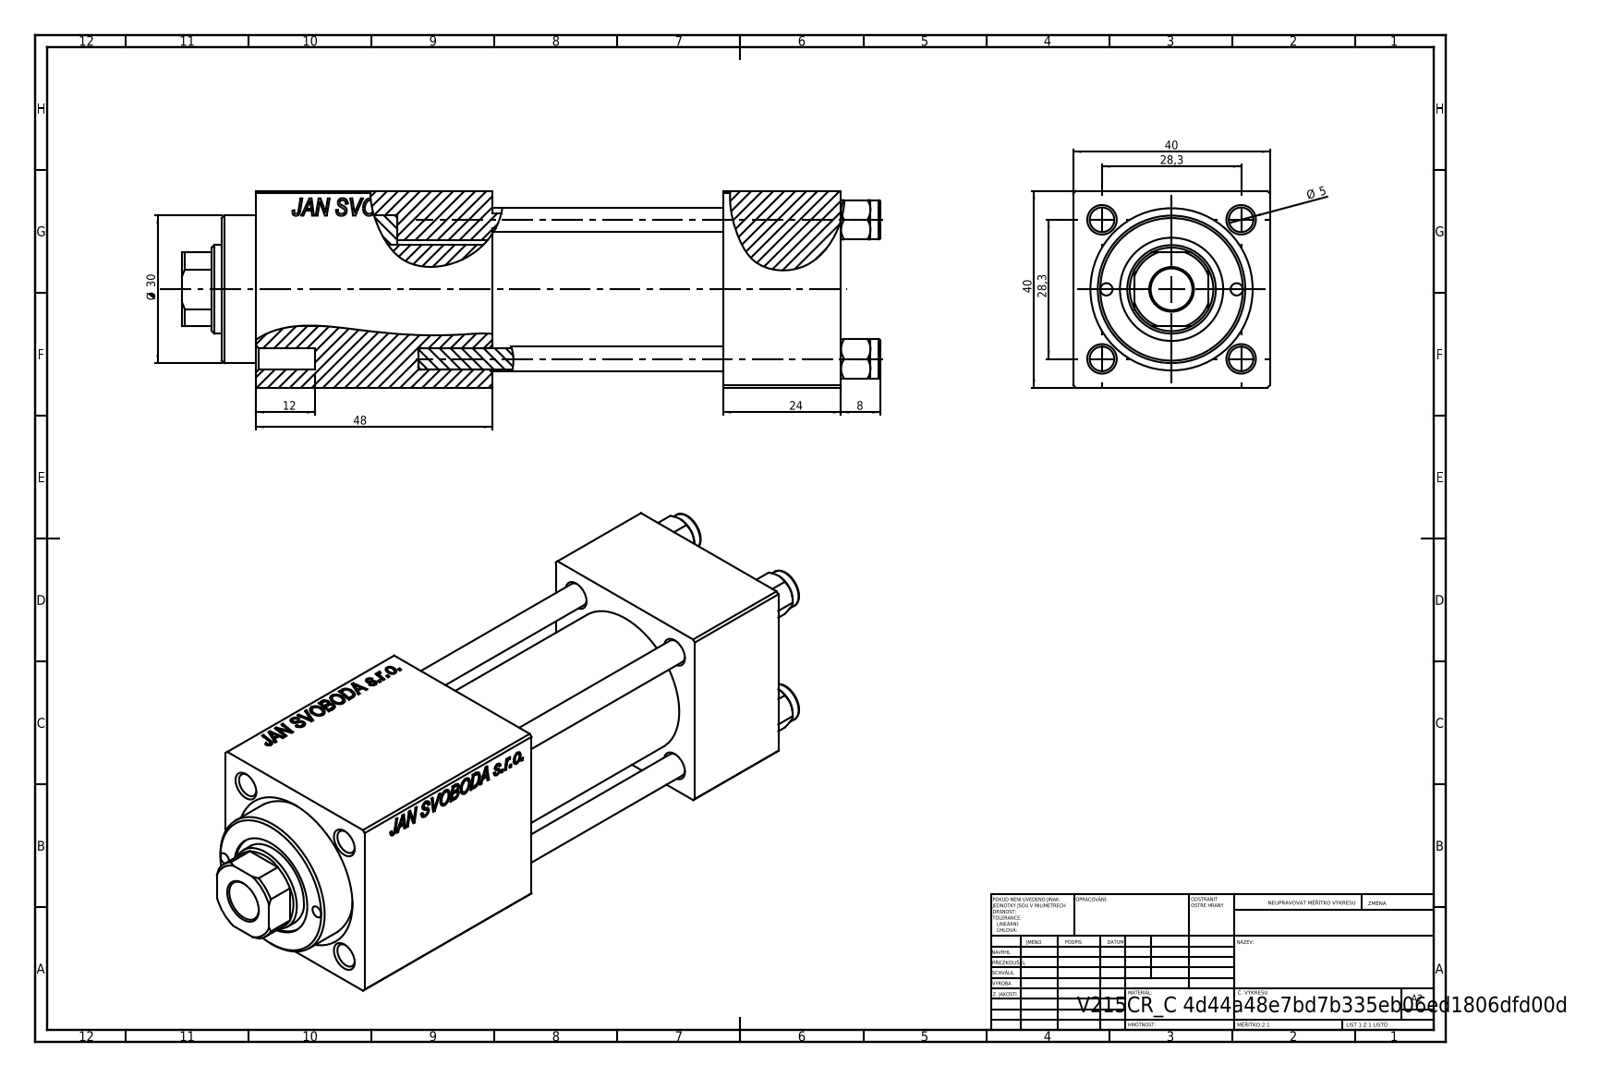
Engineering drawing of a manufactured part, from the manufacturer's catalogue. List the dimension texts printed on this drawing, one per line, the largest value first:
48
40
40
Ø 30
28,3
28,3
24
12
8
Ø 5
